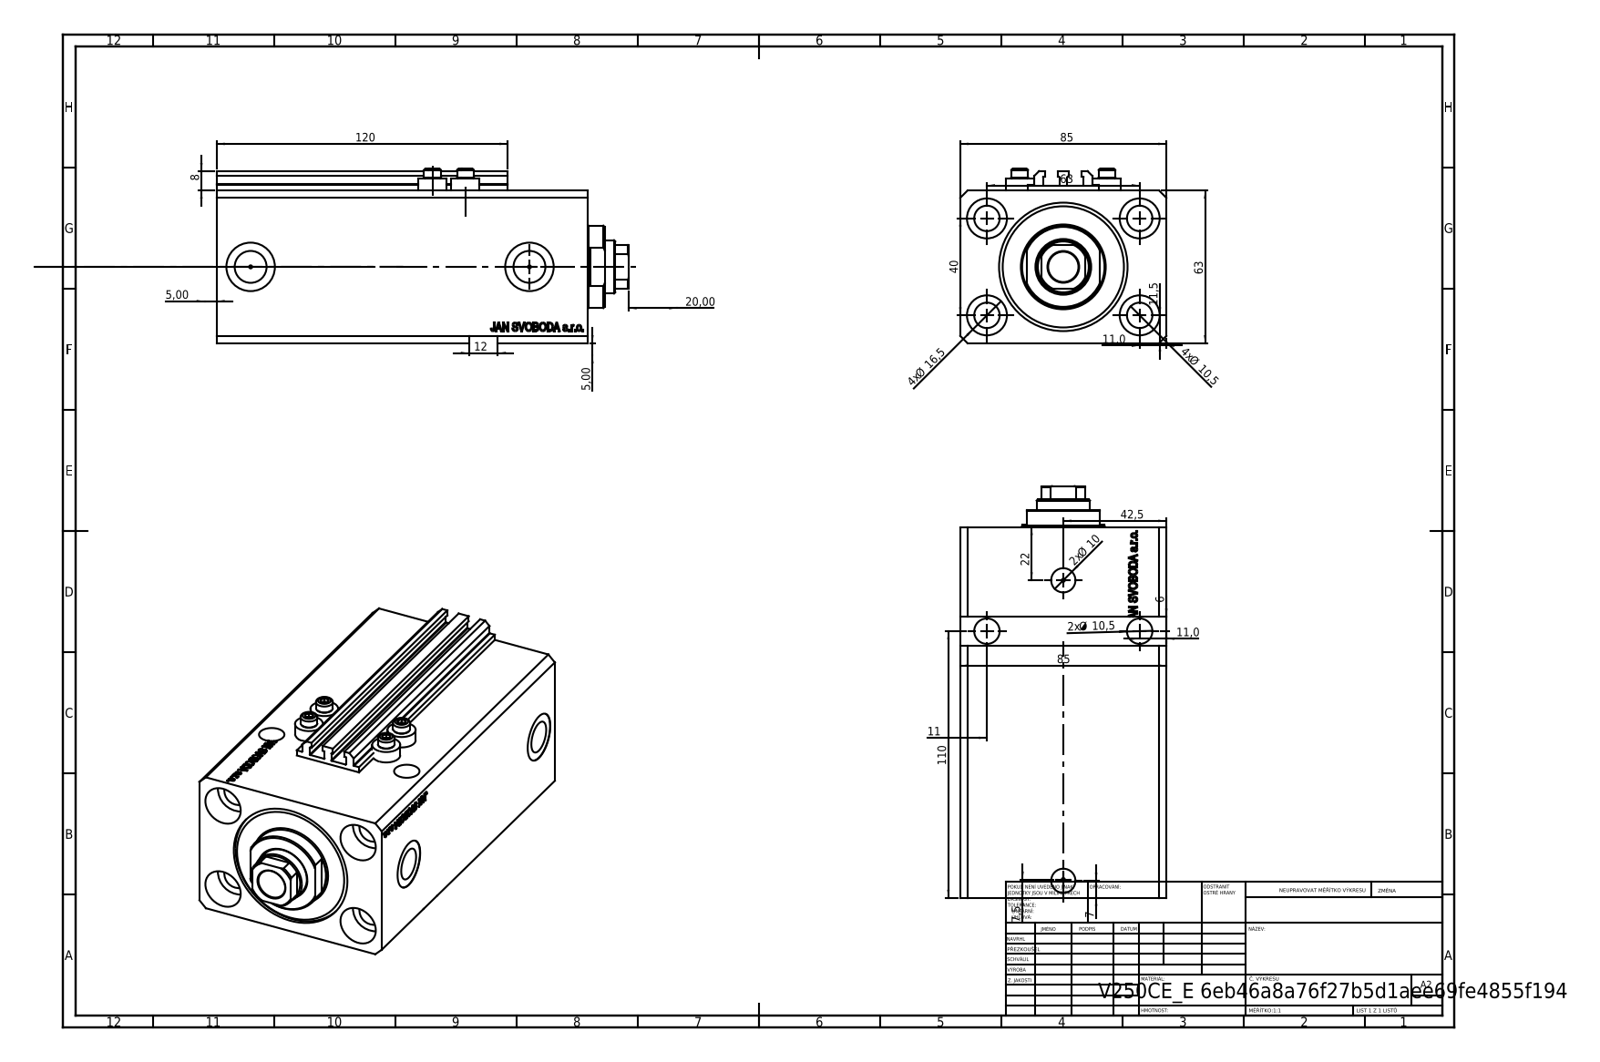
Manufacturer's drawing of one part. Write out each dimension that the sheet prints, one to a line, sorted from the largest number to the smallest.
120
110
85
85
63
63
42,5
40
22
20,00
4x Ø 16,5
12
11,5
11,0
11,0
11
4x Ø 10,5
2x Ø 10,5
2x Ø 10
8
7,5
7
6
5,00
5,00
